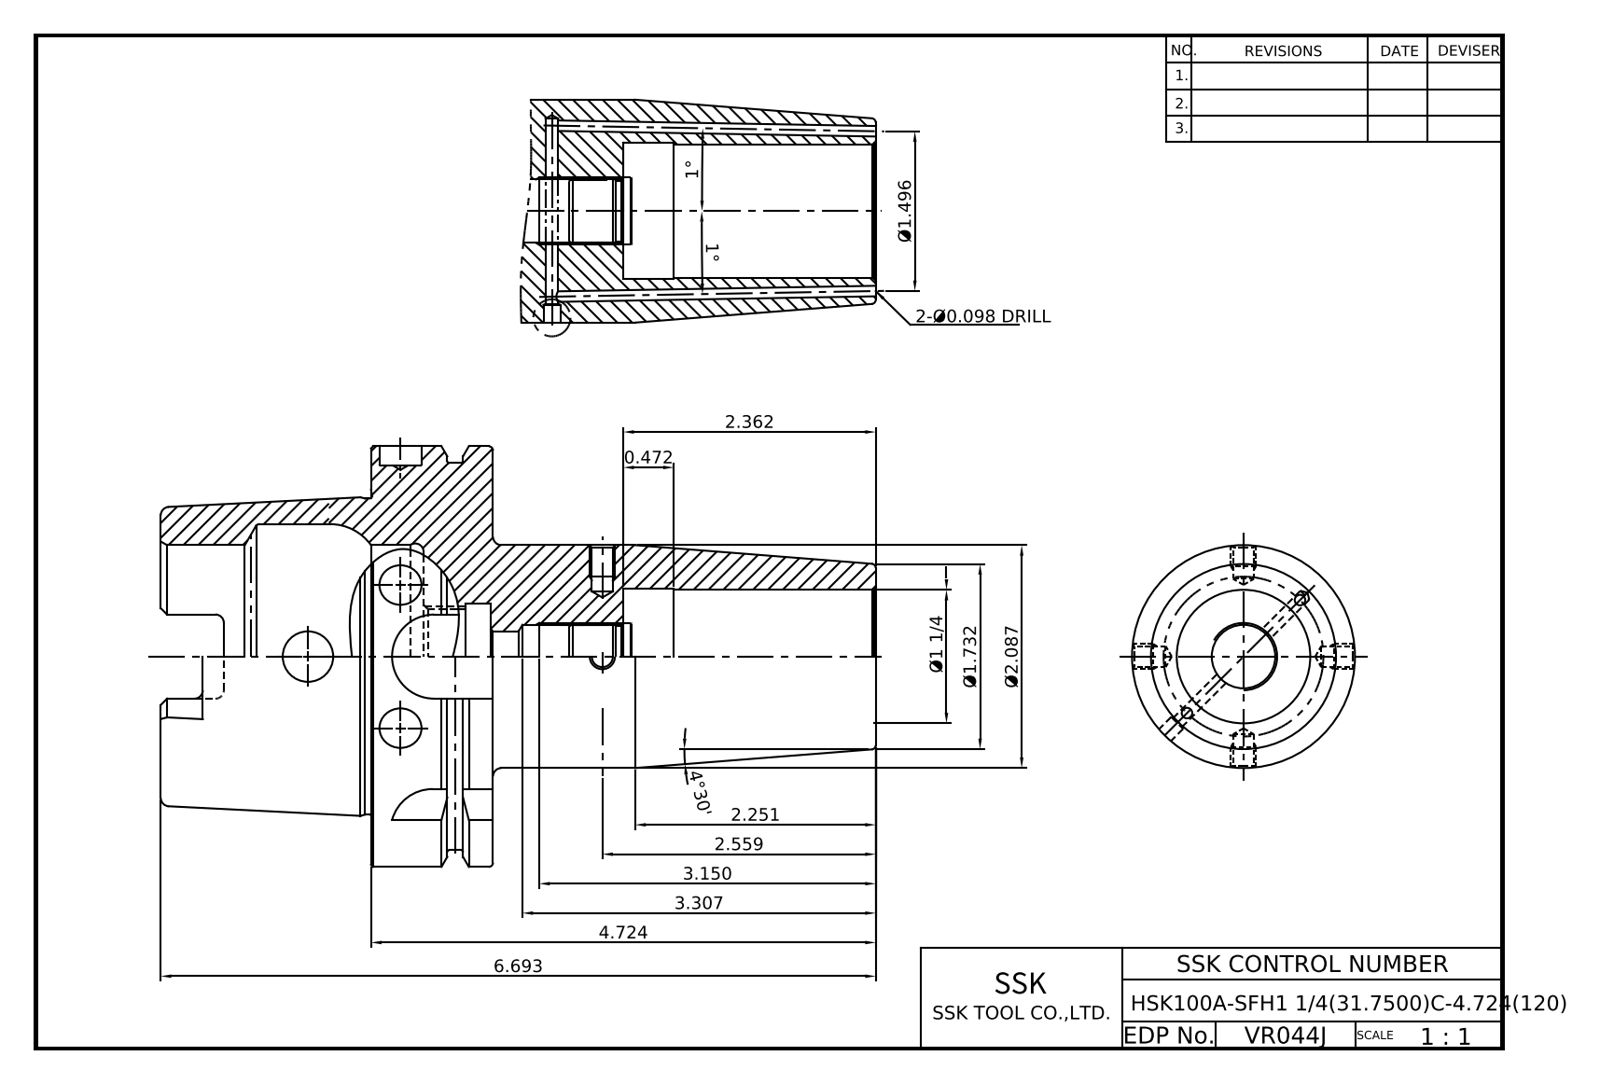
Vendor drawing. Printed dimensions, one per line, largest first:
6.693
4.724
4°30'
3.307
3.150
2.559
2.362
2.251
Ø2.087
Ø1.732
Ø1.496
Ø1 1/4
1°
1°
0.472
